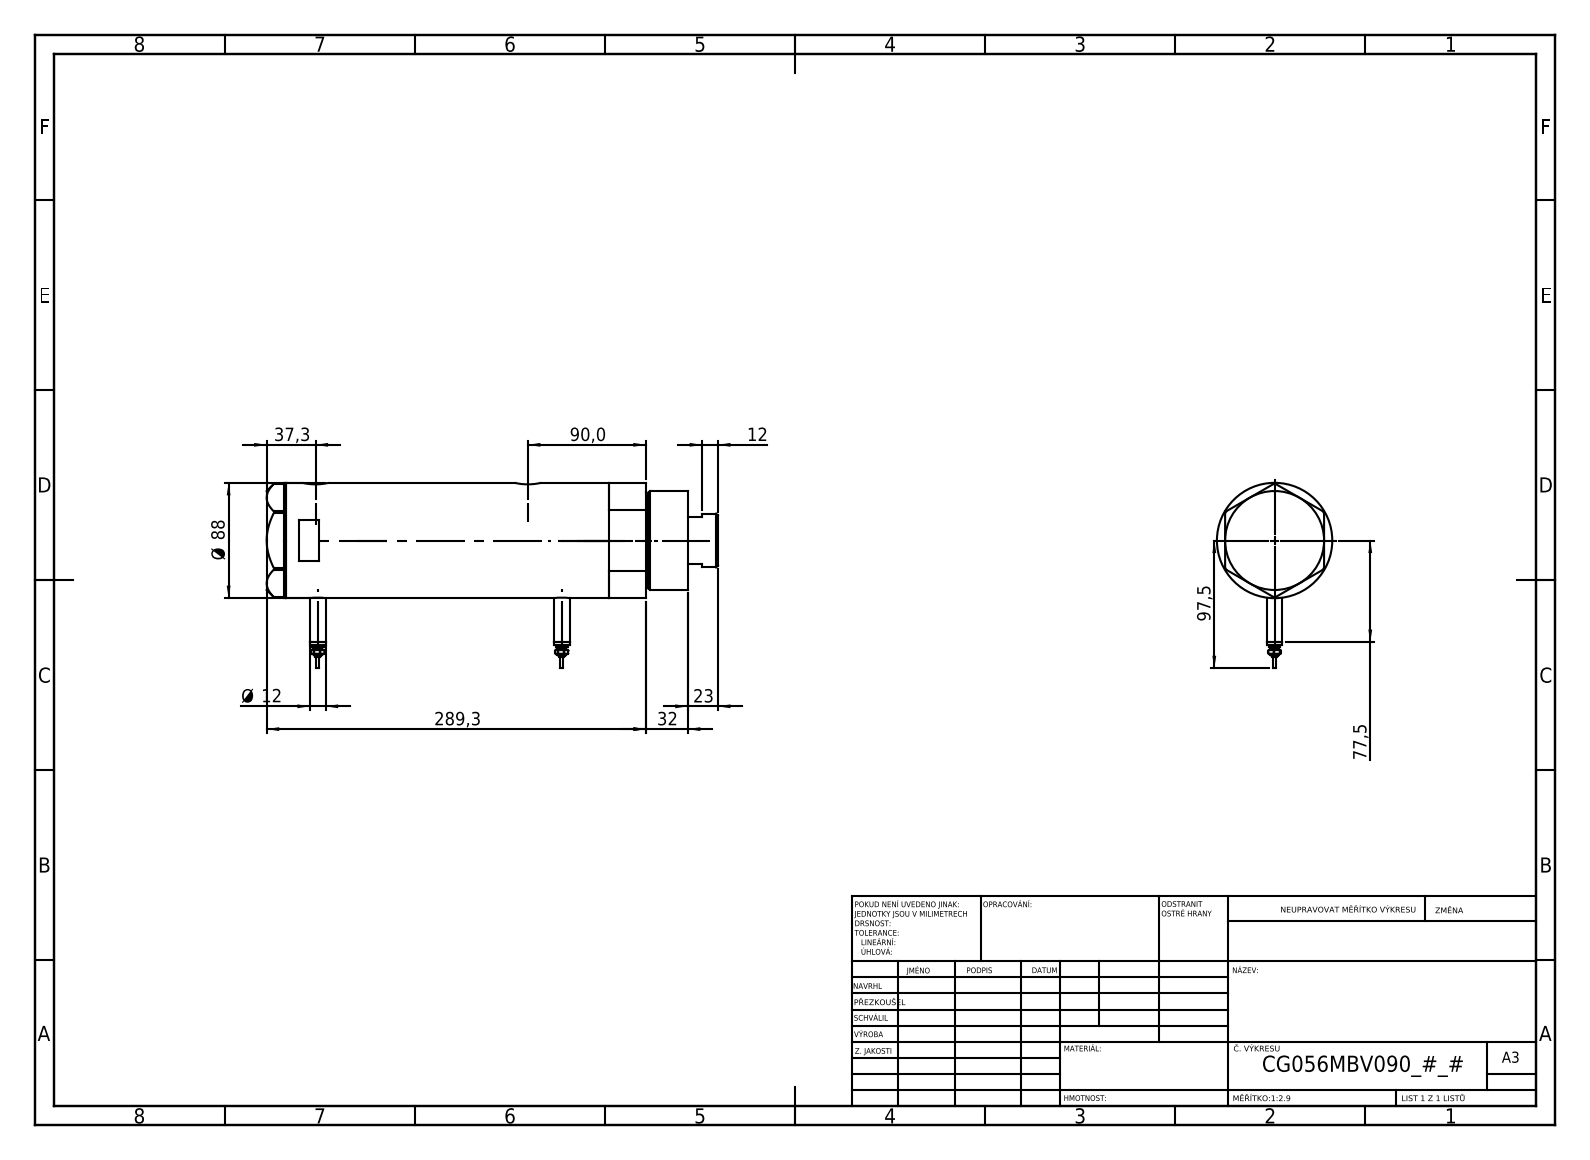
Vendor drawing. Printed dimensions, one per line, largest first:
289,3
97,5
90,0
Ø 88
77,5
37,3
32
23
12
Ø 12
